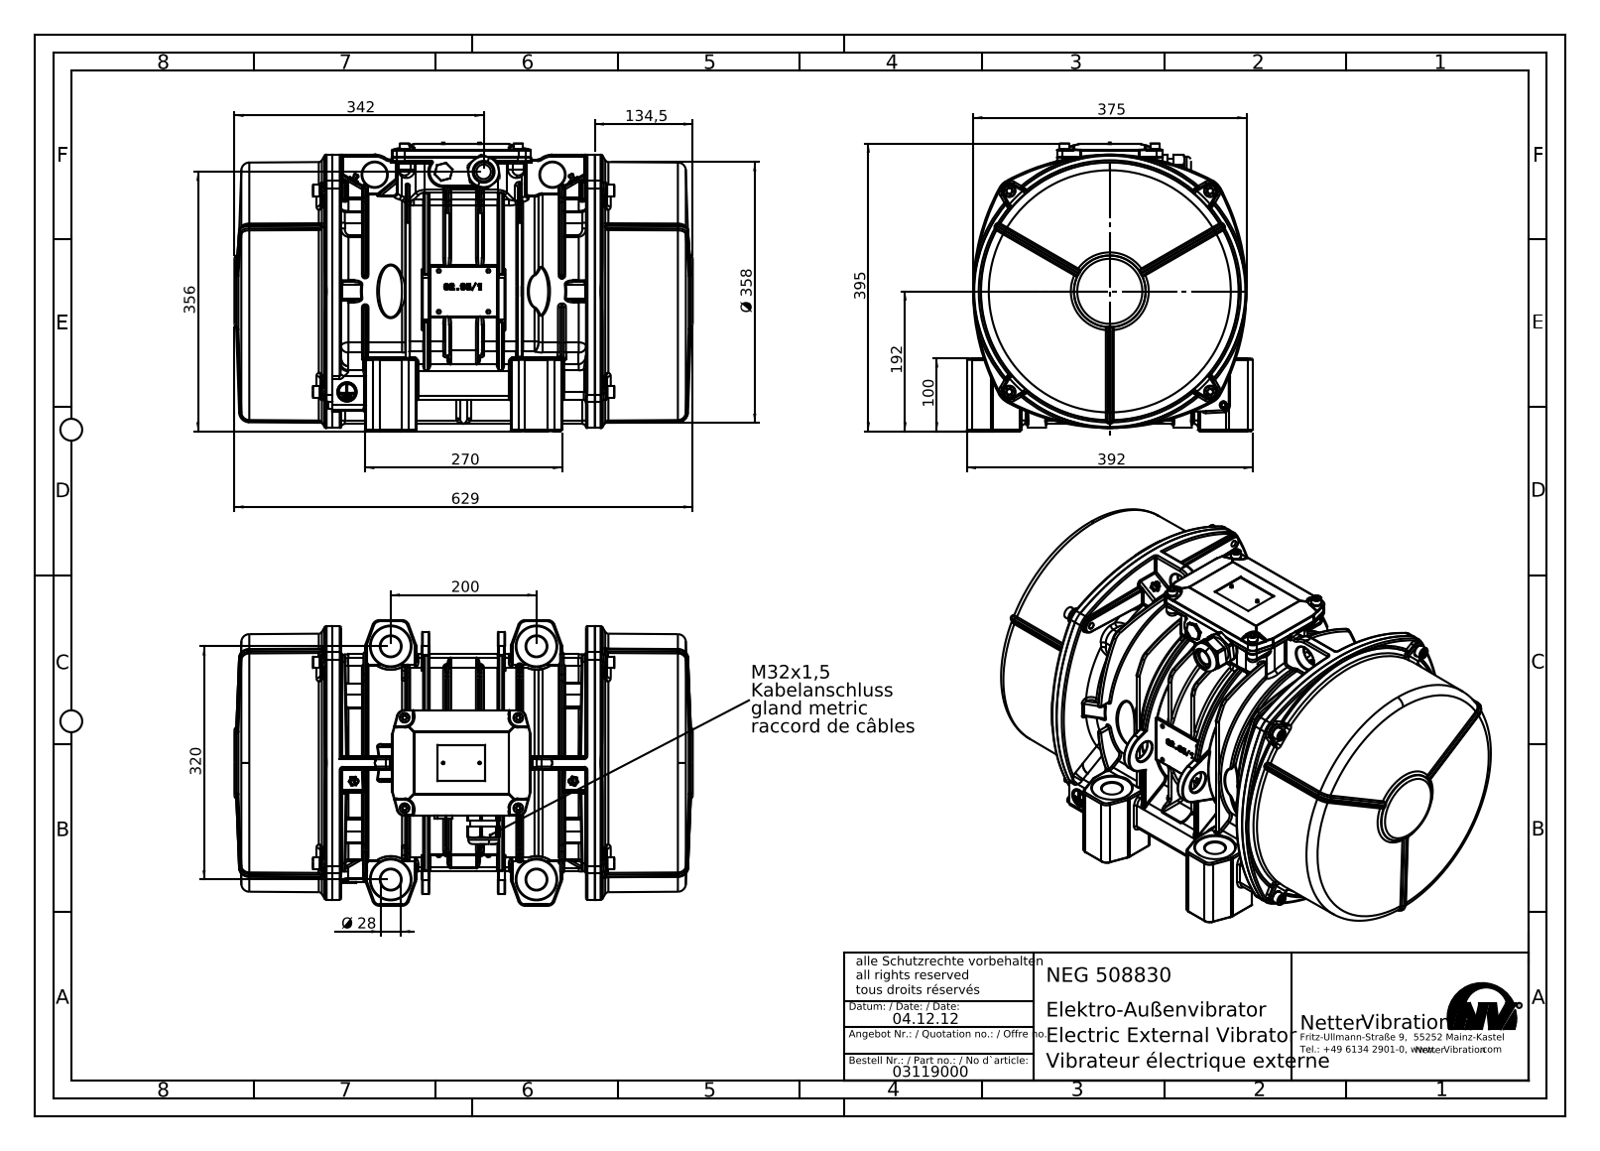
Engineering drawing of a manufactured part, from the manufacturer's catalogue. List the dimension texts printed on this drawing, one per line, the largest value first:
629
395
392
375
Ø 358
356
342
320
270
200
192
134,5
100
Ø 28
